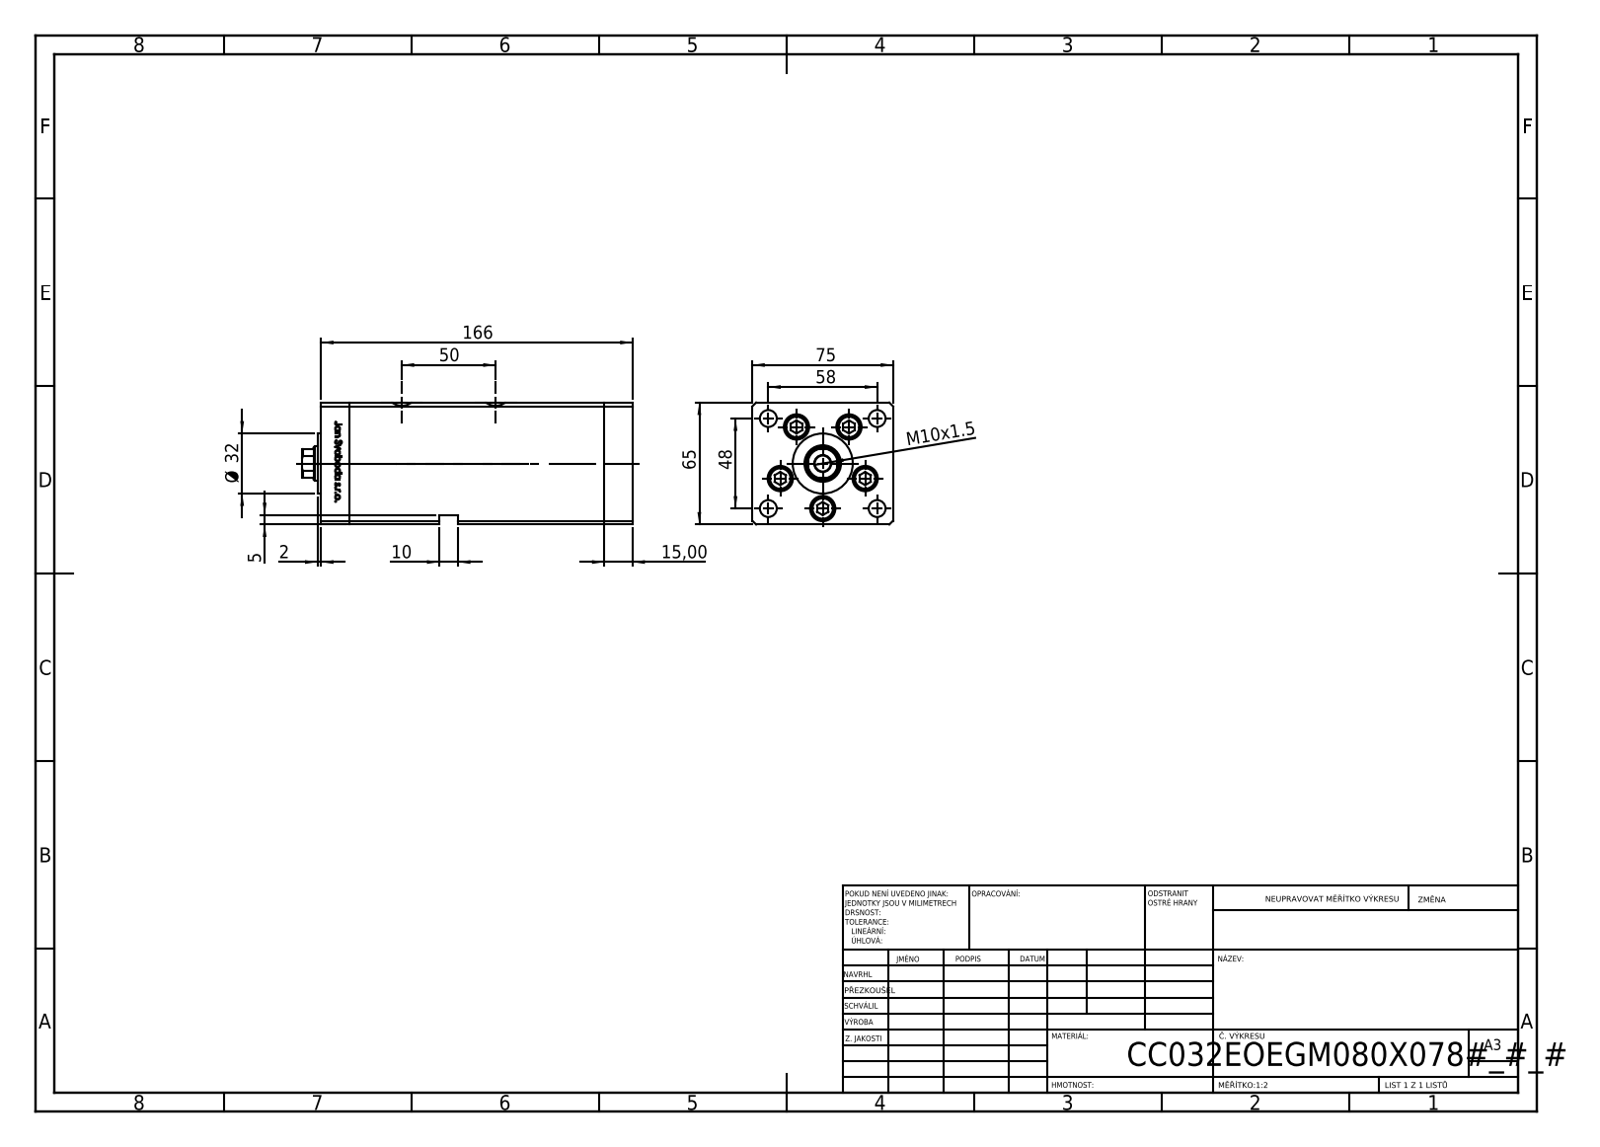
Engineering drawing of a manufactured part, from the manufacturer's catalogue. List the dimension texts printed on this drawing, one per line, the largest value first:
166
75
65
58
50
48
Ø 32
15,00
10
M10x1.5
5
2
